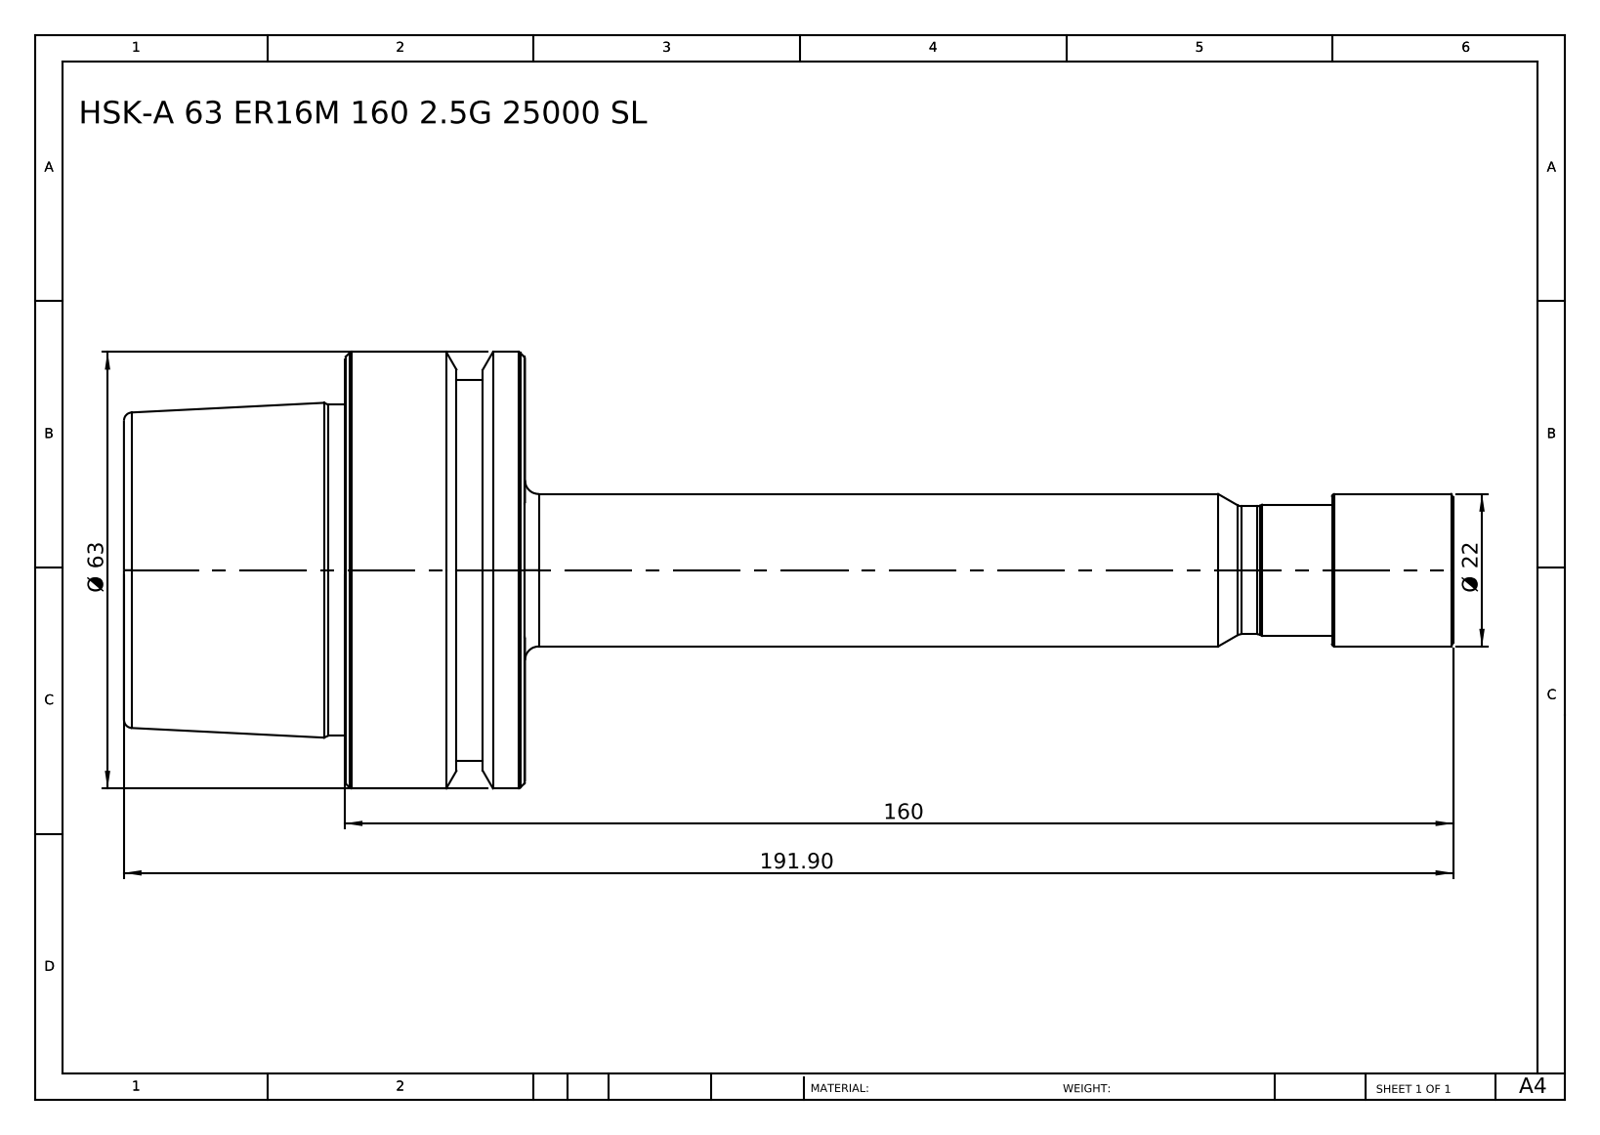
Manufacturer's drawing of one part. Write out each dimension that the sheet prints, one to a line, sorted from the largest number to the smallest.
191.90
160
Ø 63
Ø 22
